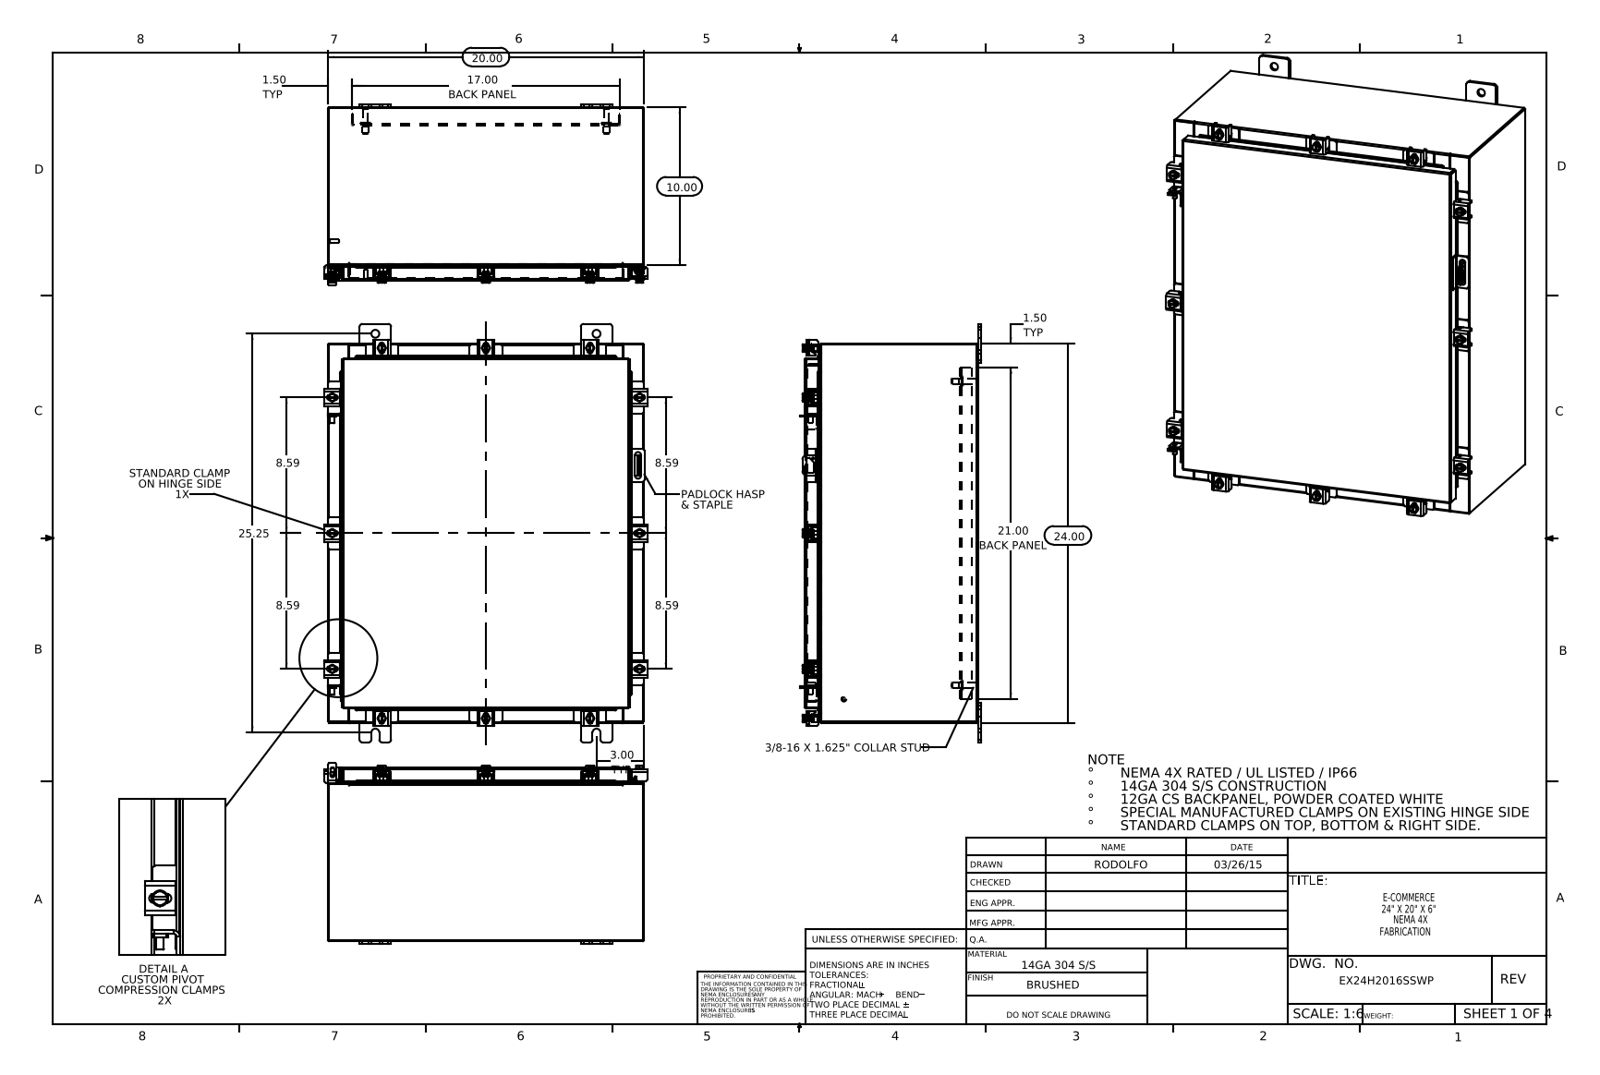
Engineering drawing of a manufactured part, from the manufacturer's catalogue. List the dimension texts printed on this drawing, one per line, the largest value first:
25.25
24.00
21.00 BACK PANEL
20.00
17.00 BACK PANEL
10.00
8.59
8.59
8.59
8.59
3.00 TYP
1.50 TYP
1.50 TYP
